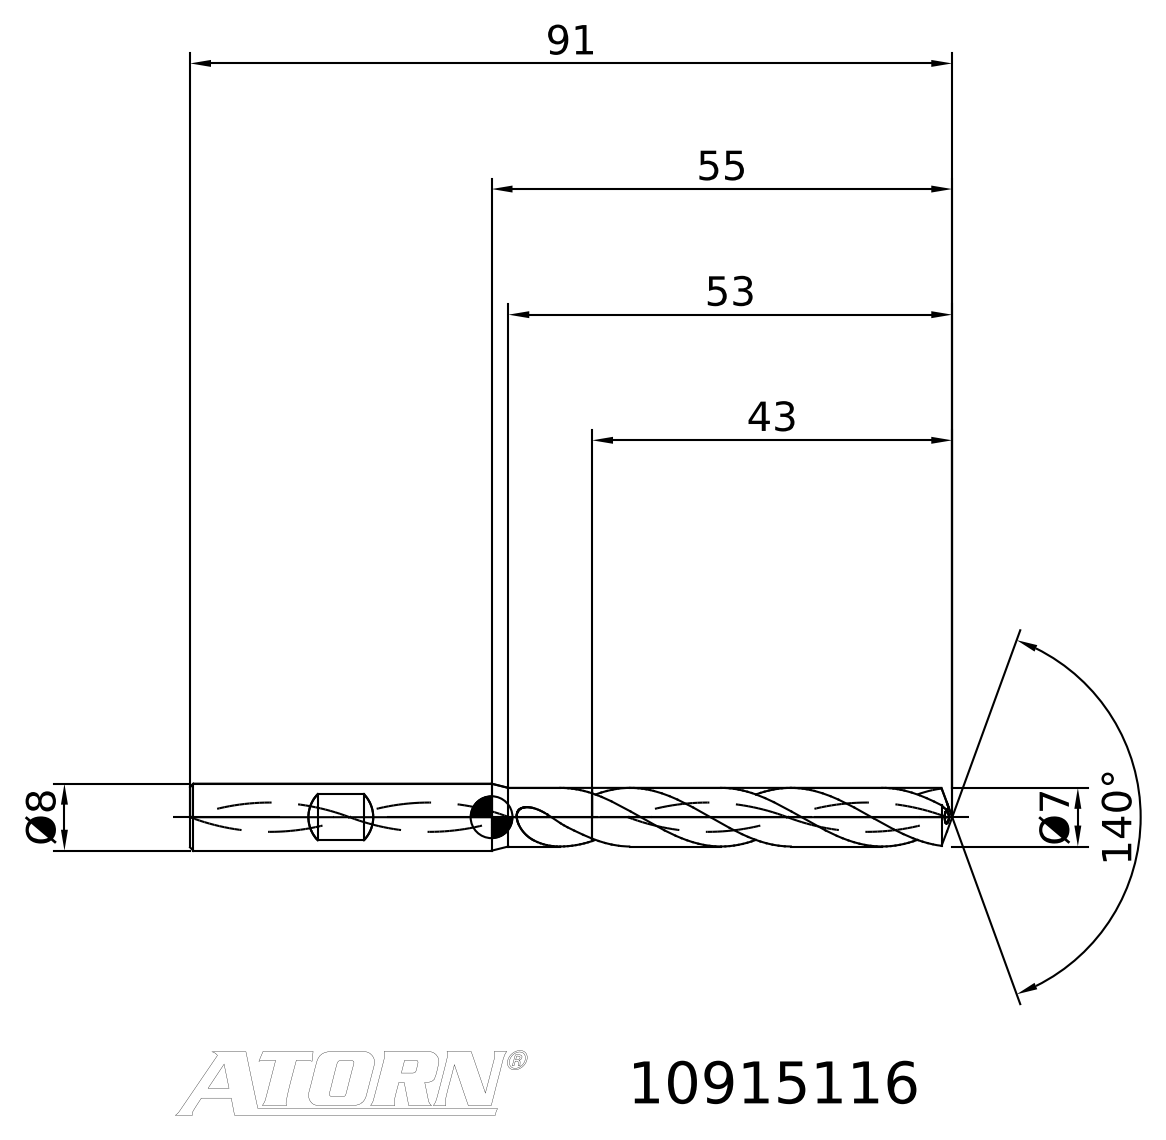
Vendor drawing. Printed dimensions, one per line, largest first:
140°
91
55
53
43
Ø8
Ø7
